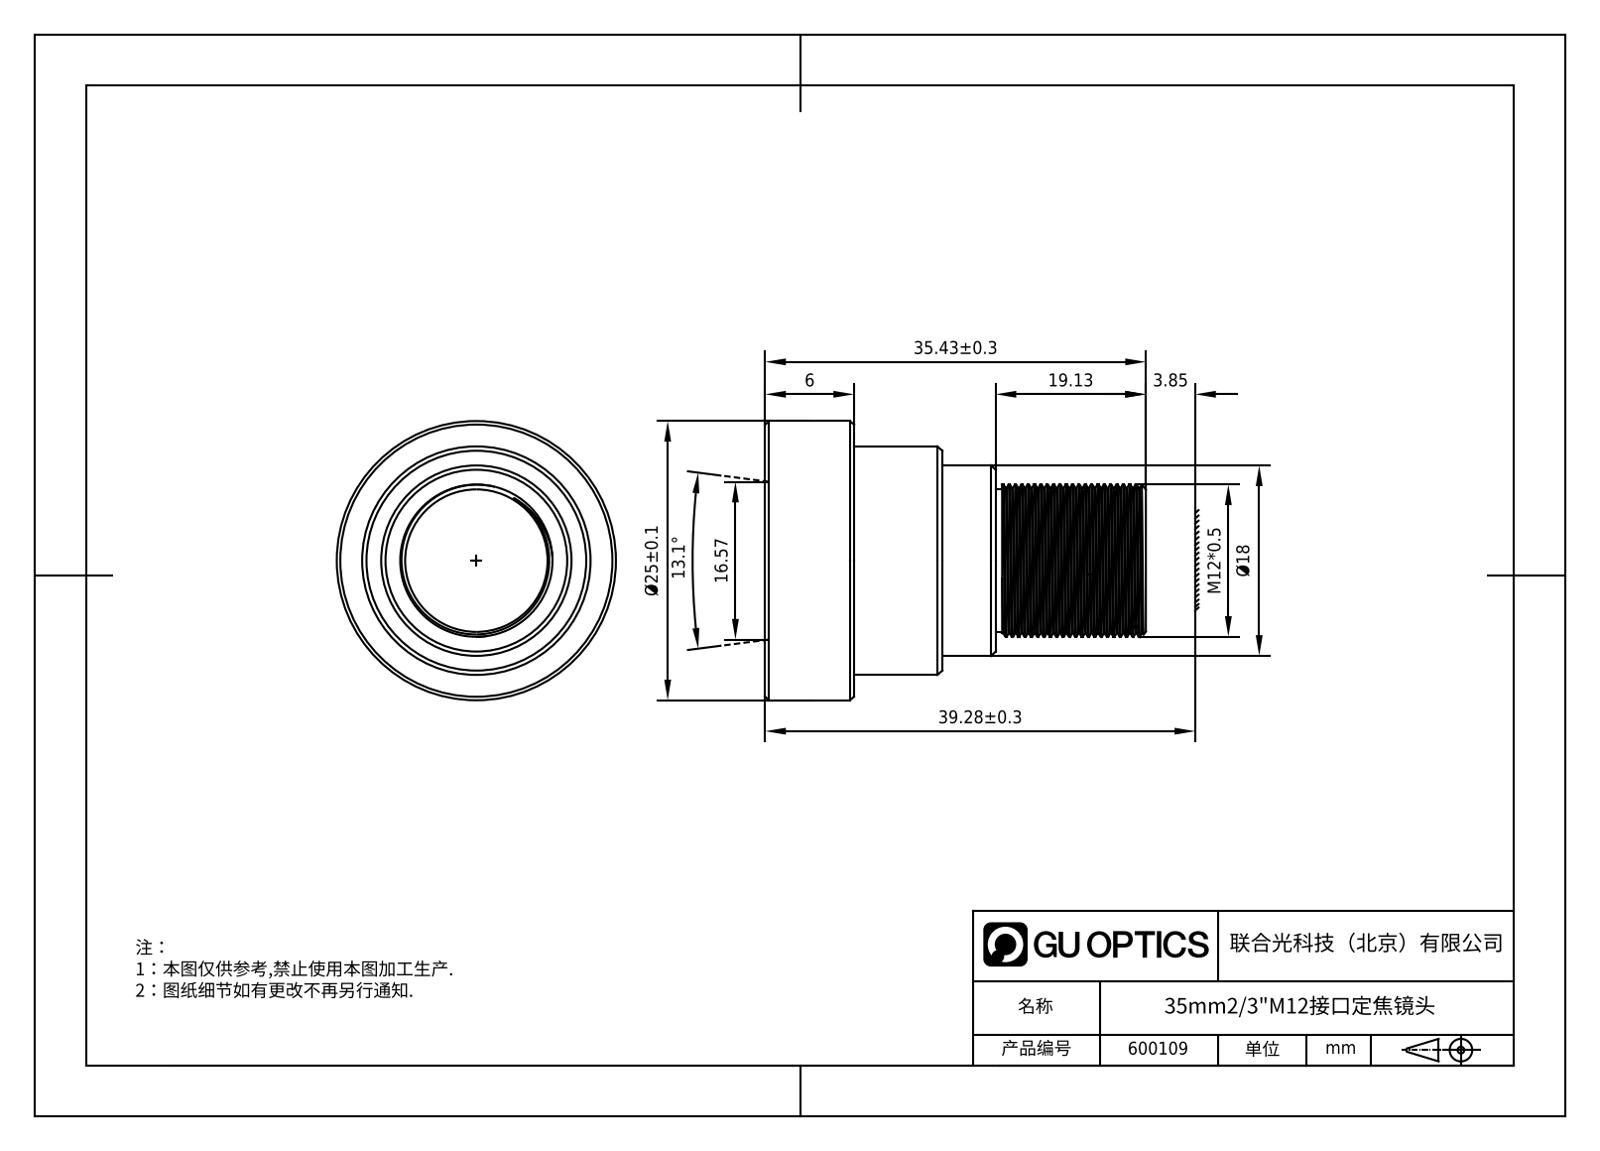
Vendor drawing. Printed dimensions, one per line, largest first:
39.28±0.3
35.43±0.3
Ø25±0.1
19.13
Ø18
16.57
13.1°
M12*0.5
6
3.85
